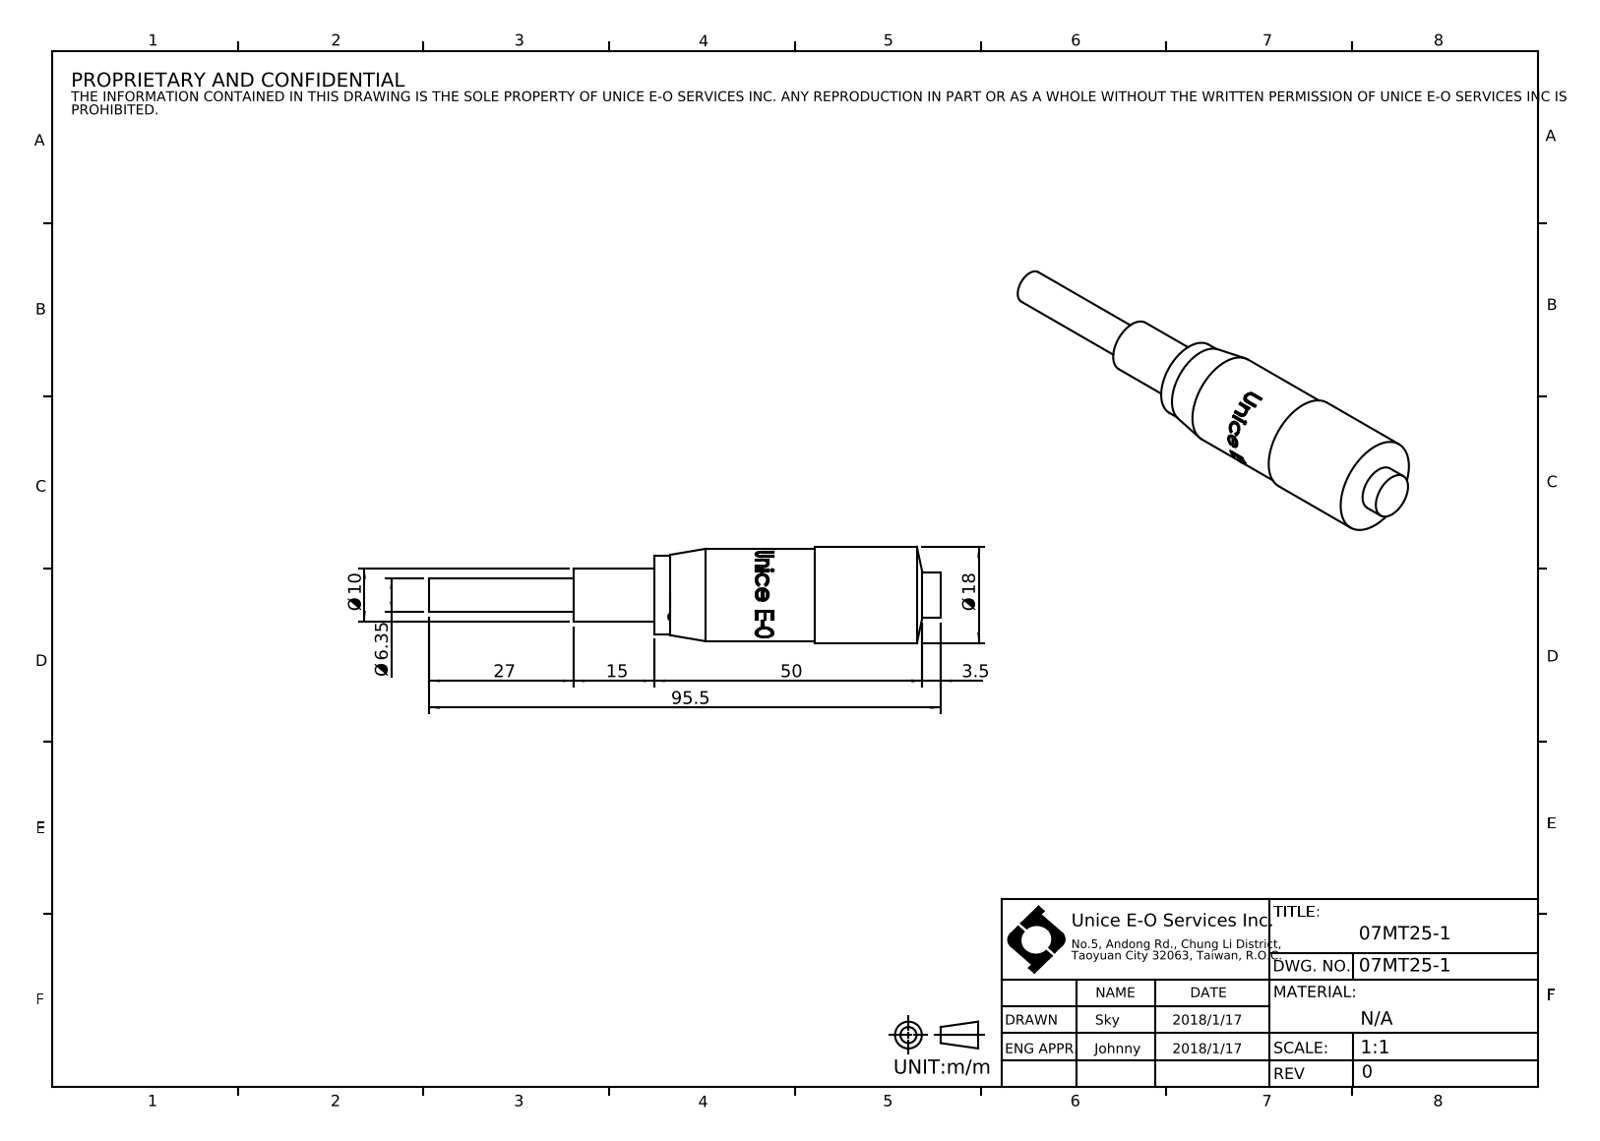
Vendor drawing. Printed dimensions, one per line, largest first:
95.5
50
27
Ø 18
15
Ø 10
Ø 6.35
3.5
